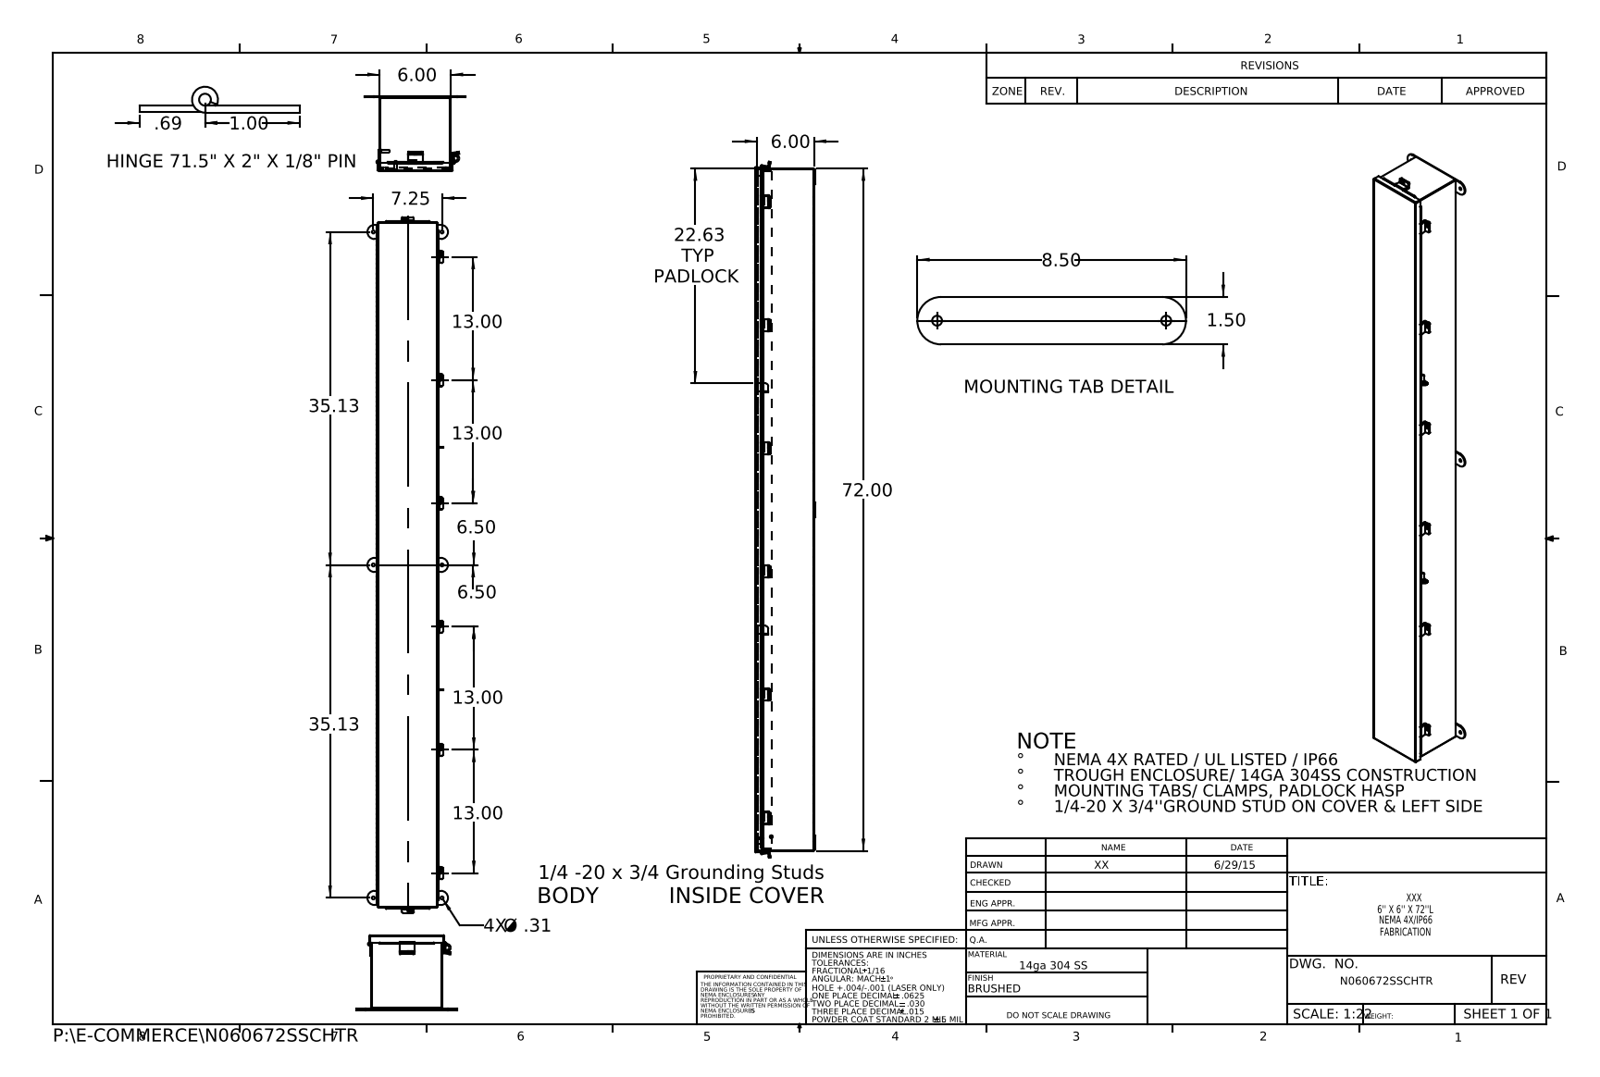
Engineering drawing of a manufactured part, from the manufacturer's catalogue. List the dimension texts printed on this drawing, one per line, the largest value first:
72.00
35.13
35.13
22.63 TYP PADLOCK
13.00
13.00
13.00
13.00
8.50
7.25
6.50
6.50
6.00
6.00
1.50
1.00
.69
4X Ø .31
